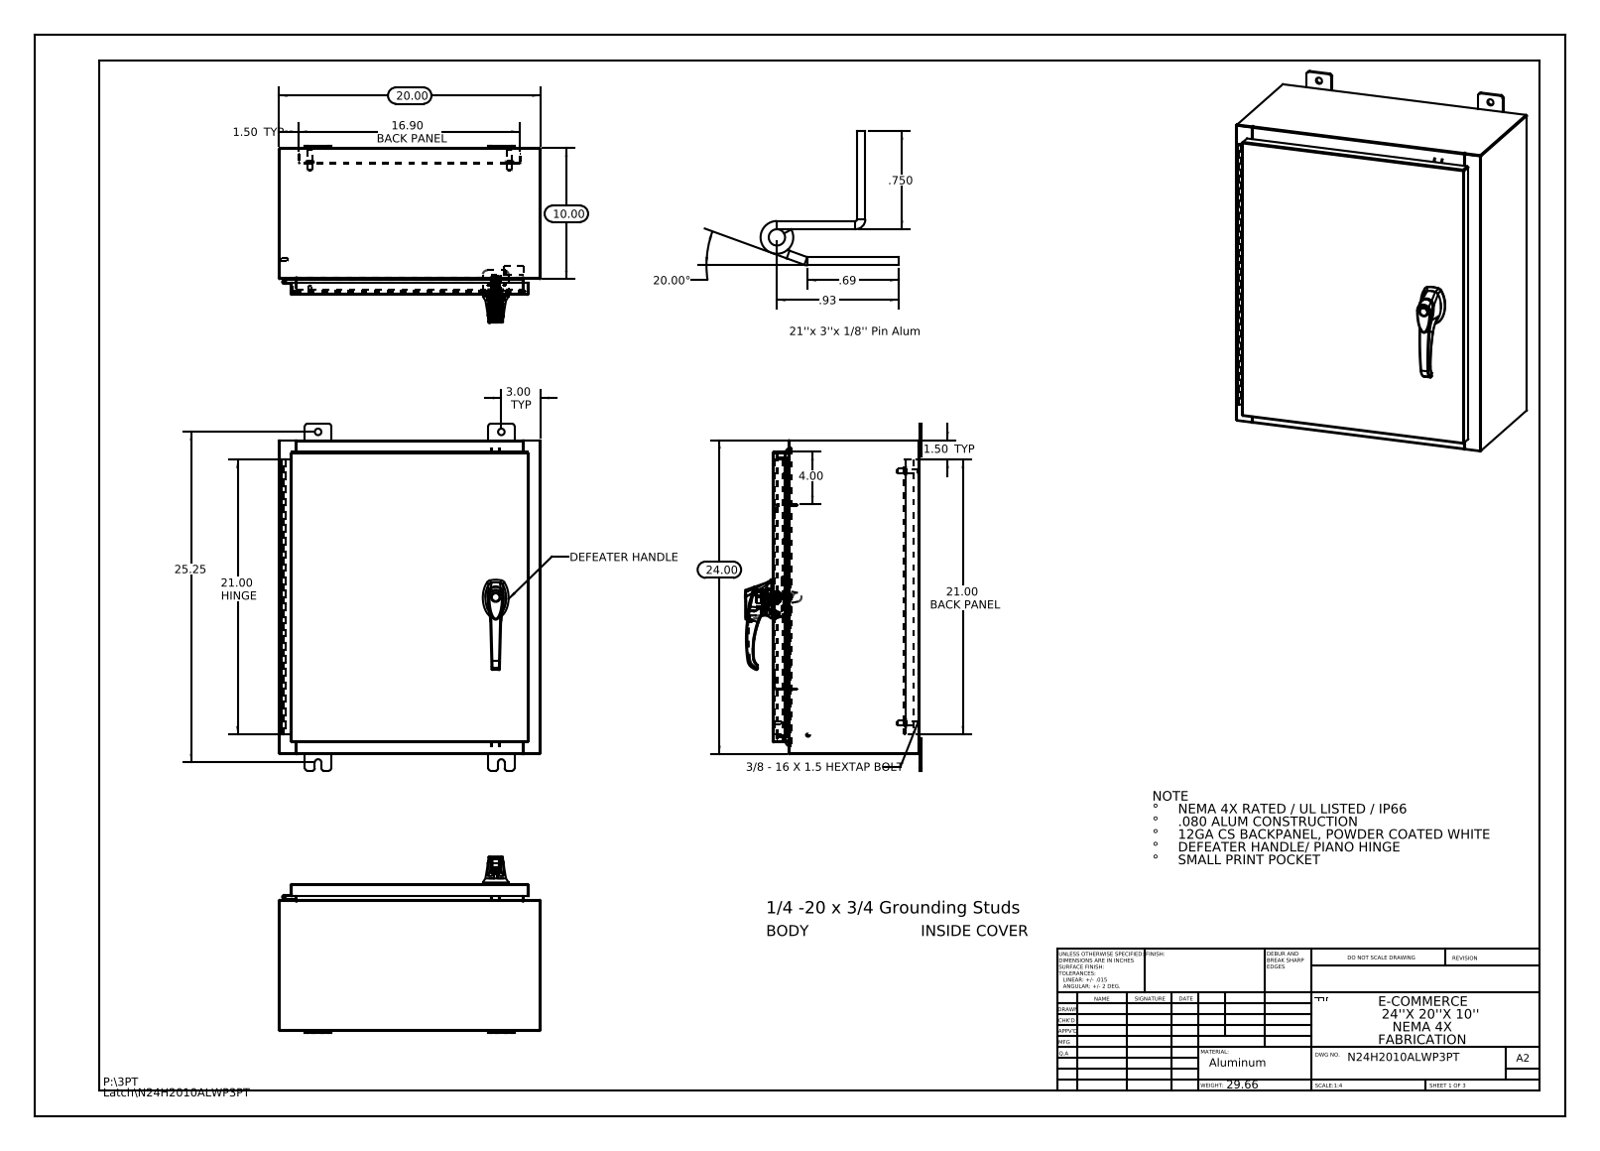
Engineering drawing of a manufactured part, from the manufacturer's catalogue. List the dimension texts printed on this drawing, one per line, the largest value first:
25.25
24.00
21.00 HINGE
21.00 BACK PANEL
20.00
20.00°
16.90 BACK PANEL
10.00
4.00
3.00 TYP
1.50 TYP
1.50 TYP
.93
.750
.69
